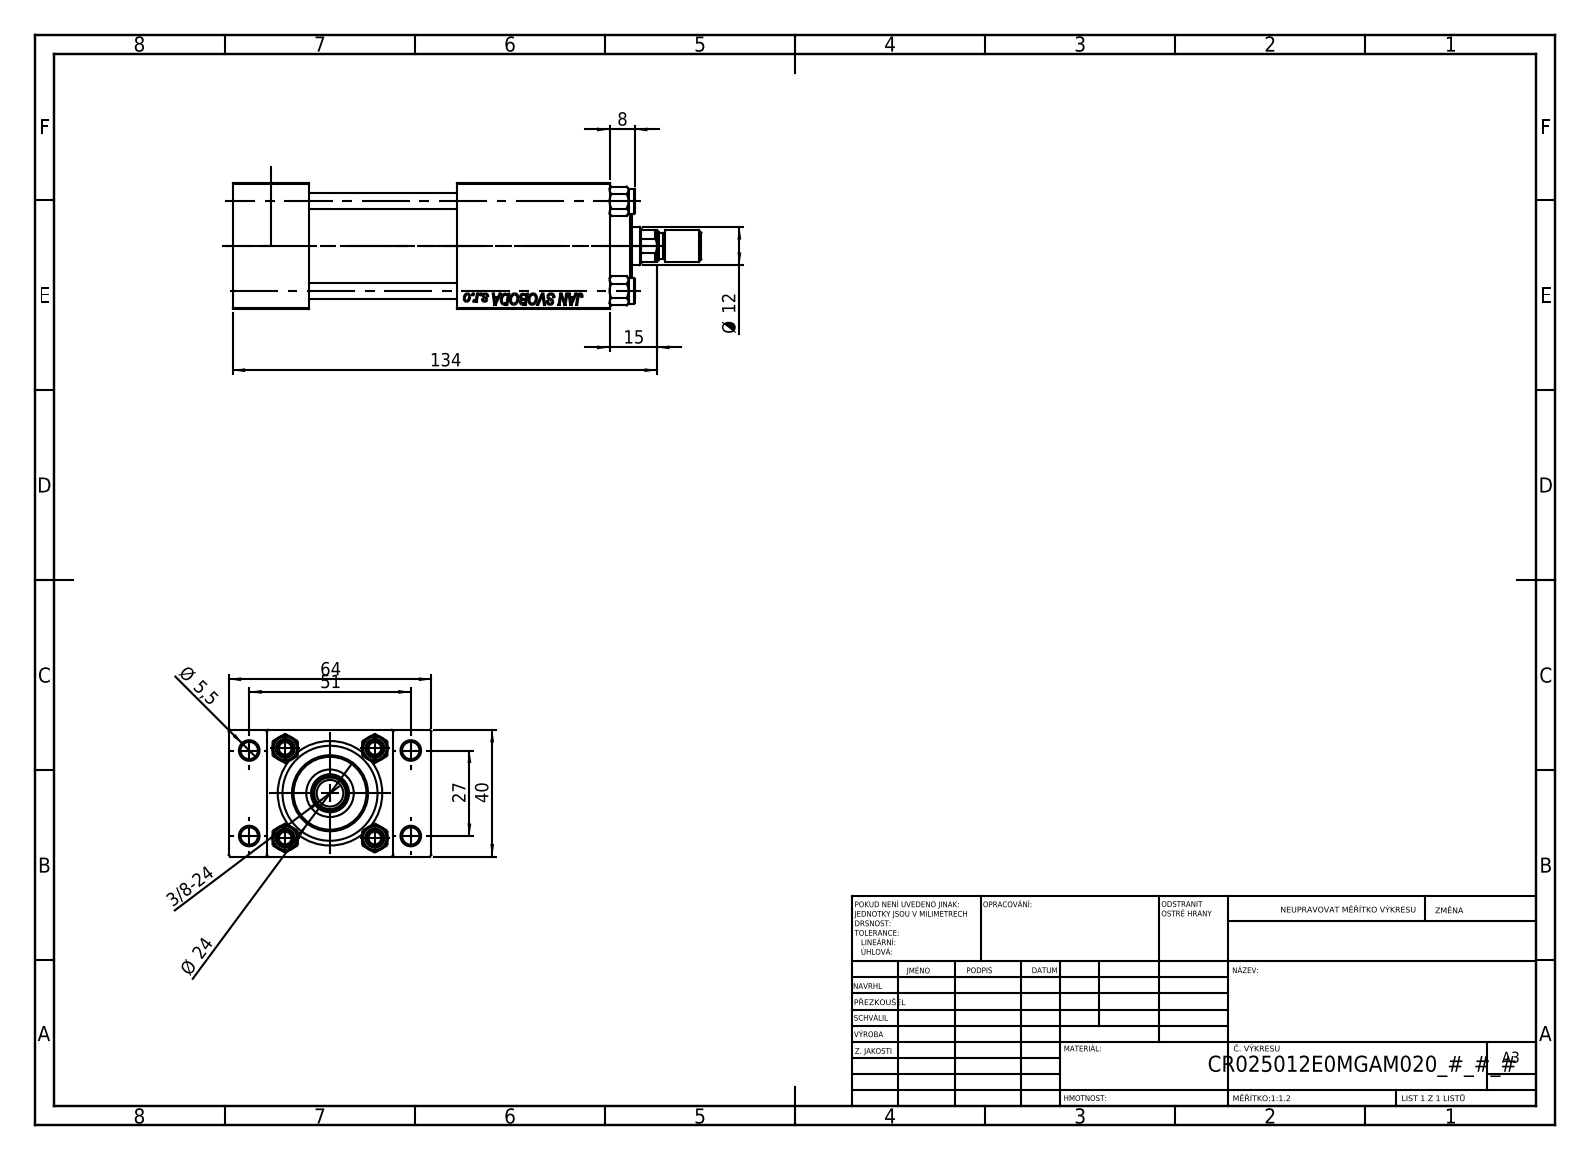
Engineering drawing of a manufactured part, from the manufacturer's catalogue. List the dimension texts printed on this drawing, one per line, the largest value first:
134
64
51
40
27
Ø 24
15
Ø 12
8
Ø 5,5
3/8-24
